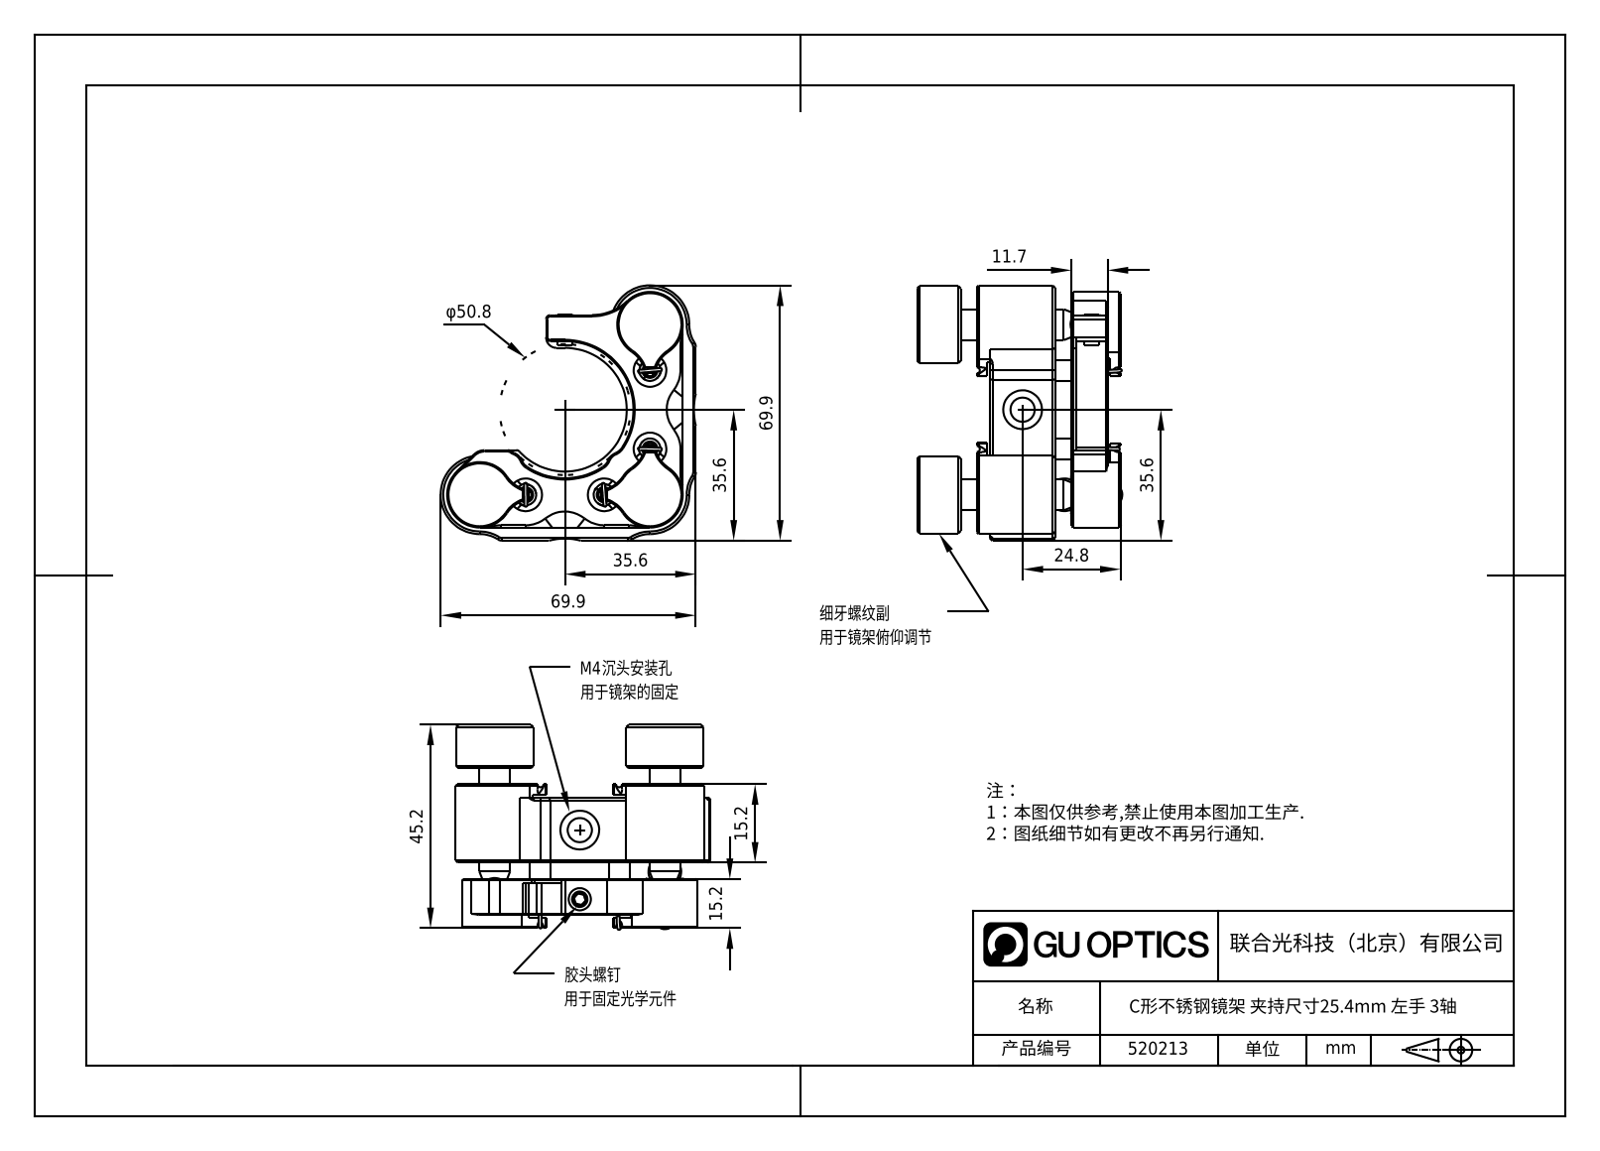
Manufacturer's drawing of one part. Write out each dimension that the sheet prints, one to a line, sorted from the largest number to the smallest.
69.9
69.9
45.2
35.6
35.6
35.6
24.8
15.2
15.2
11.7
